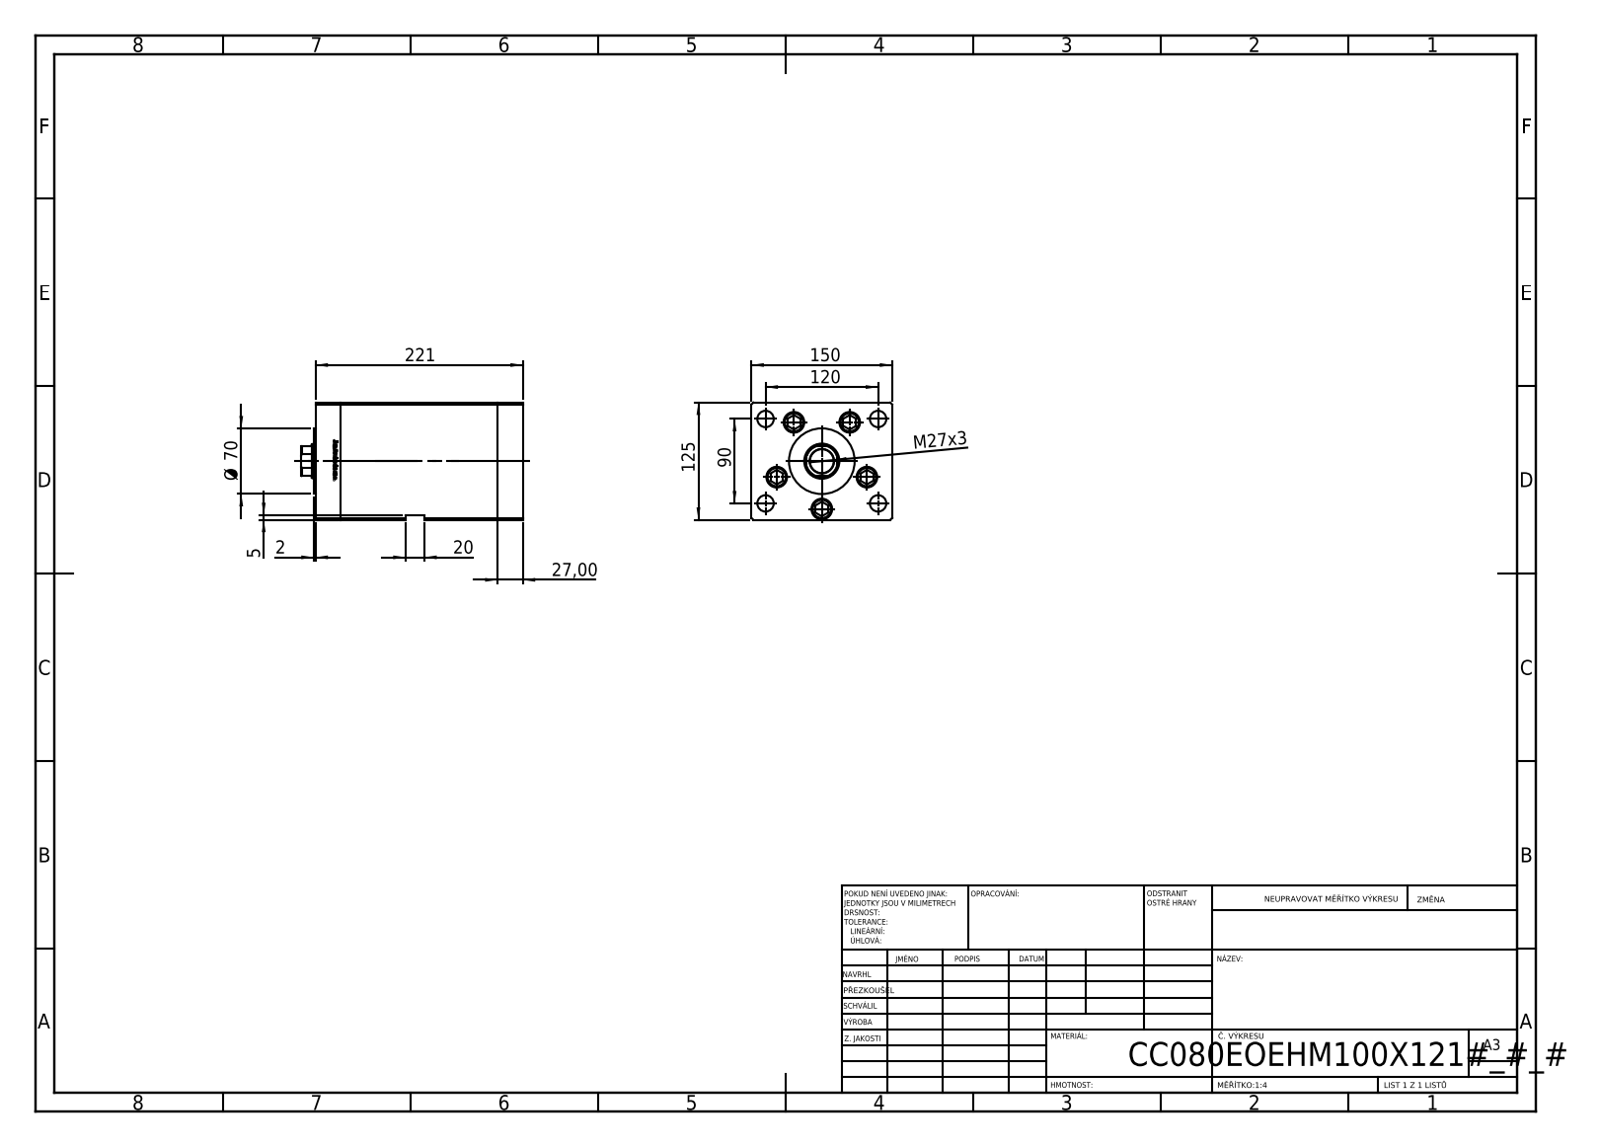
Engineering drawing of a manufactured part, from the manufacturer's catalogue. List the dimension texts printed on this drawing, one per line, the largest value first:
221
150
125
120
90
Ø 70
27,00
M27x3
20
5
2
